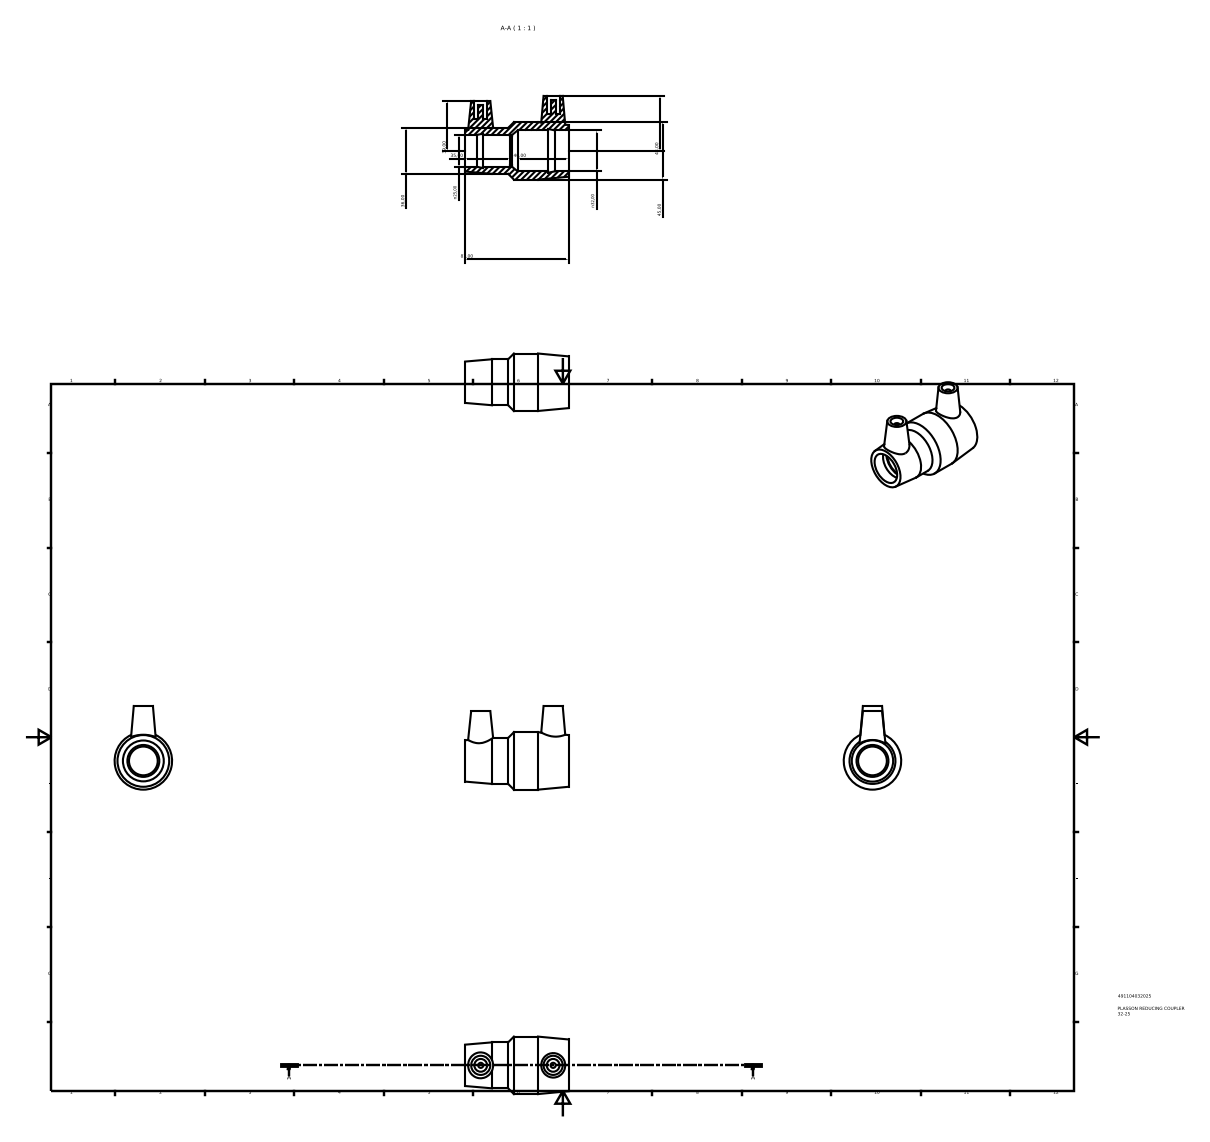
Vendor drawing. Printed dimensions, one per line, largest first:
81,00
45,00
43,00
40,00
39,00
36,00
35,00
n32,00
n25,00
